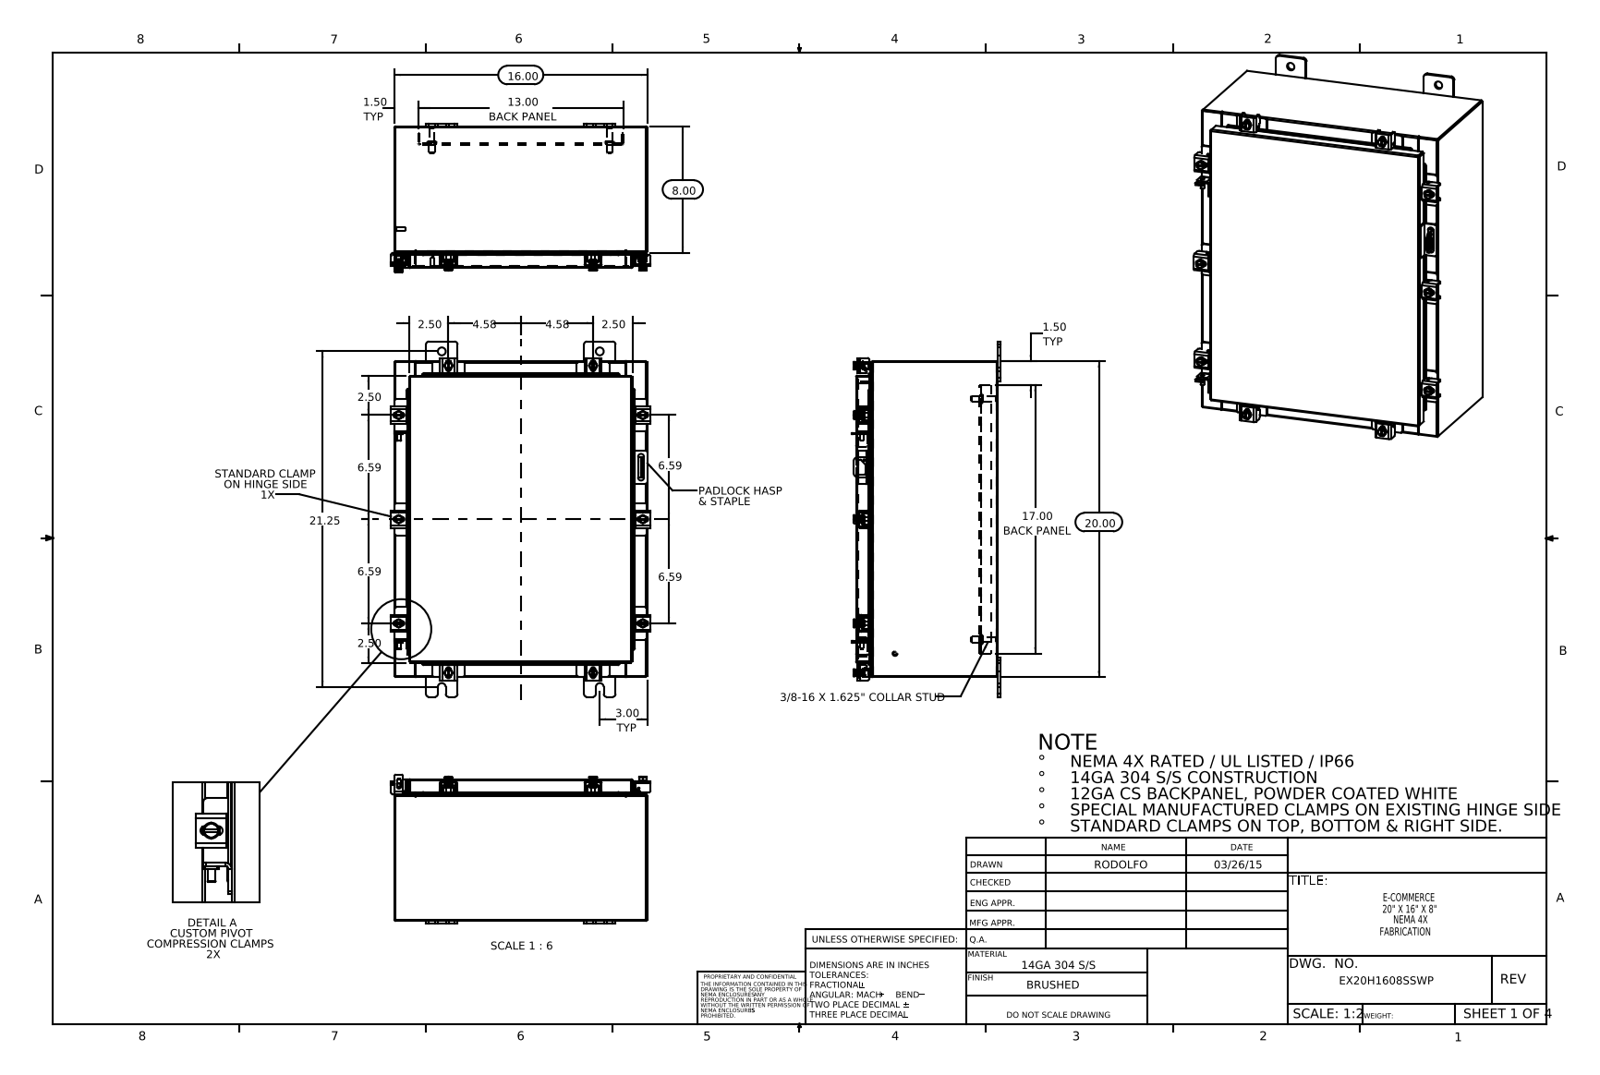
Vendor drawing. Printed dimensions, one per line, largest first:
21.25
20.00
17.00 BACK PANEL
16.00
13.00 BACK PANEL
8.00
6.59
6.59
6.59
6.59
4.58
4.58
3.00 TYP
2.50
2.50
2.50
2.50
1.50 TYP
1.50 TYP
